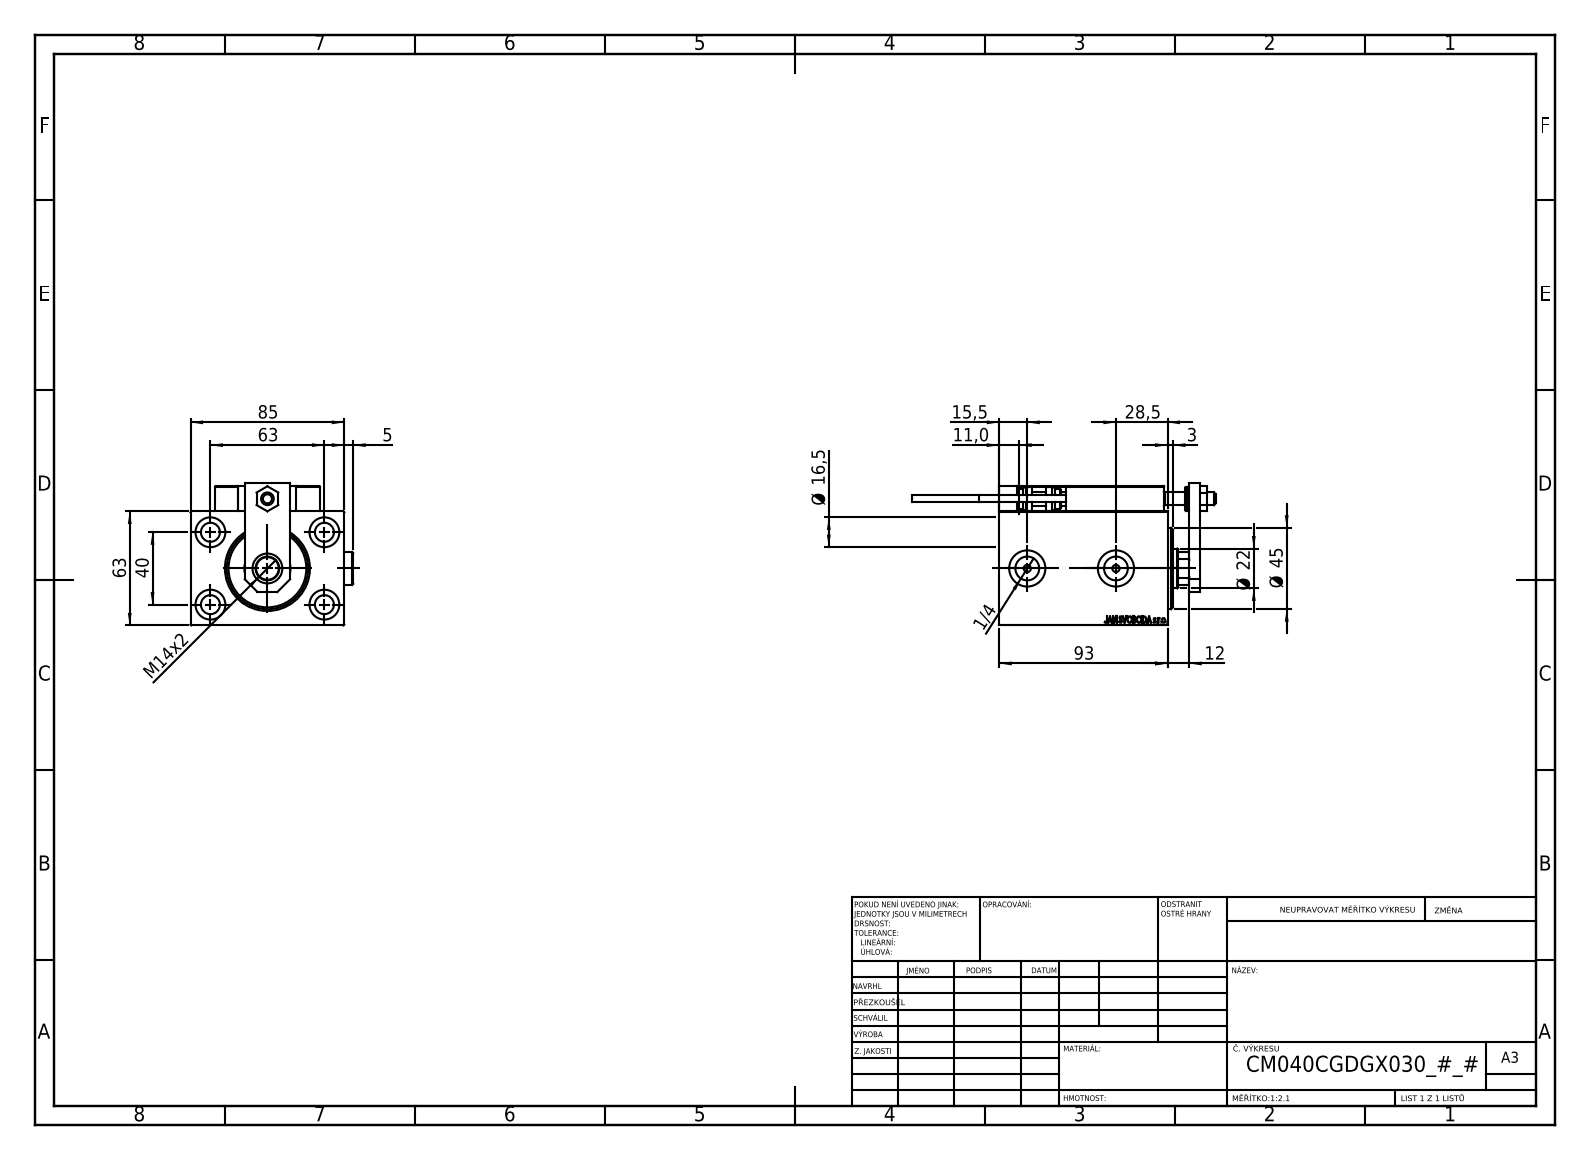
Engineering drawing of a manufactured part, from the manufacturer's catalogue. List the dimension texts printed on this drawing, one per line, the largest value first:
93
85
63
63
Ø 45
40
28,5
Ø 22
Ø 16,5
15,5
M14x2
12
11,0
5
3
1/4
